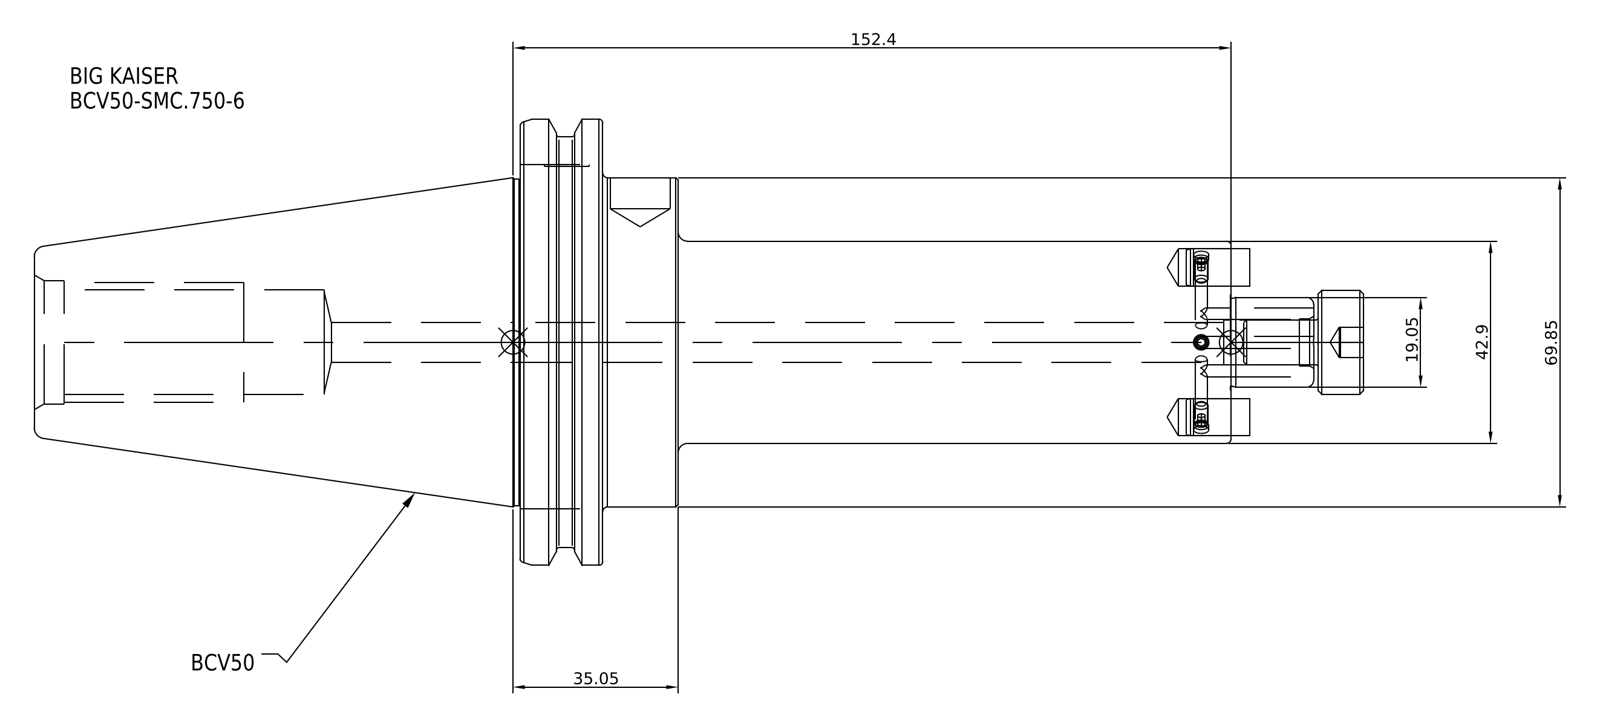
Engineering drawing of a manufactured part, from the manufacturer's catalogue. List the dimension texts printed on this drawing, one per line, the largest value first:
152.4
69.85
42.9
35.05
19.05
